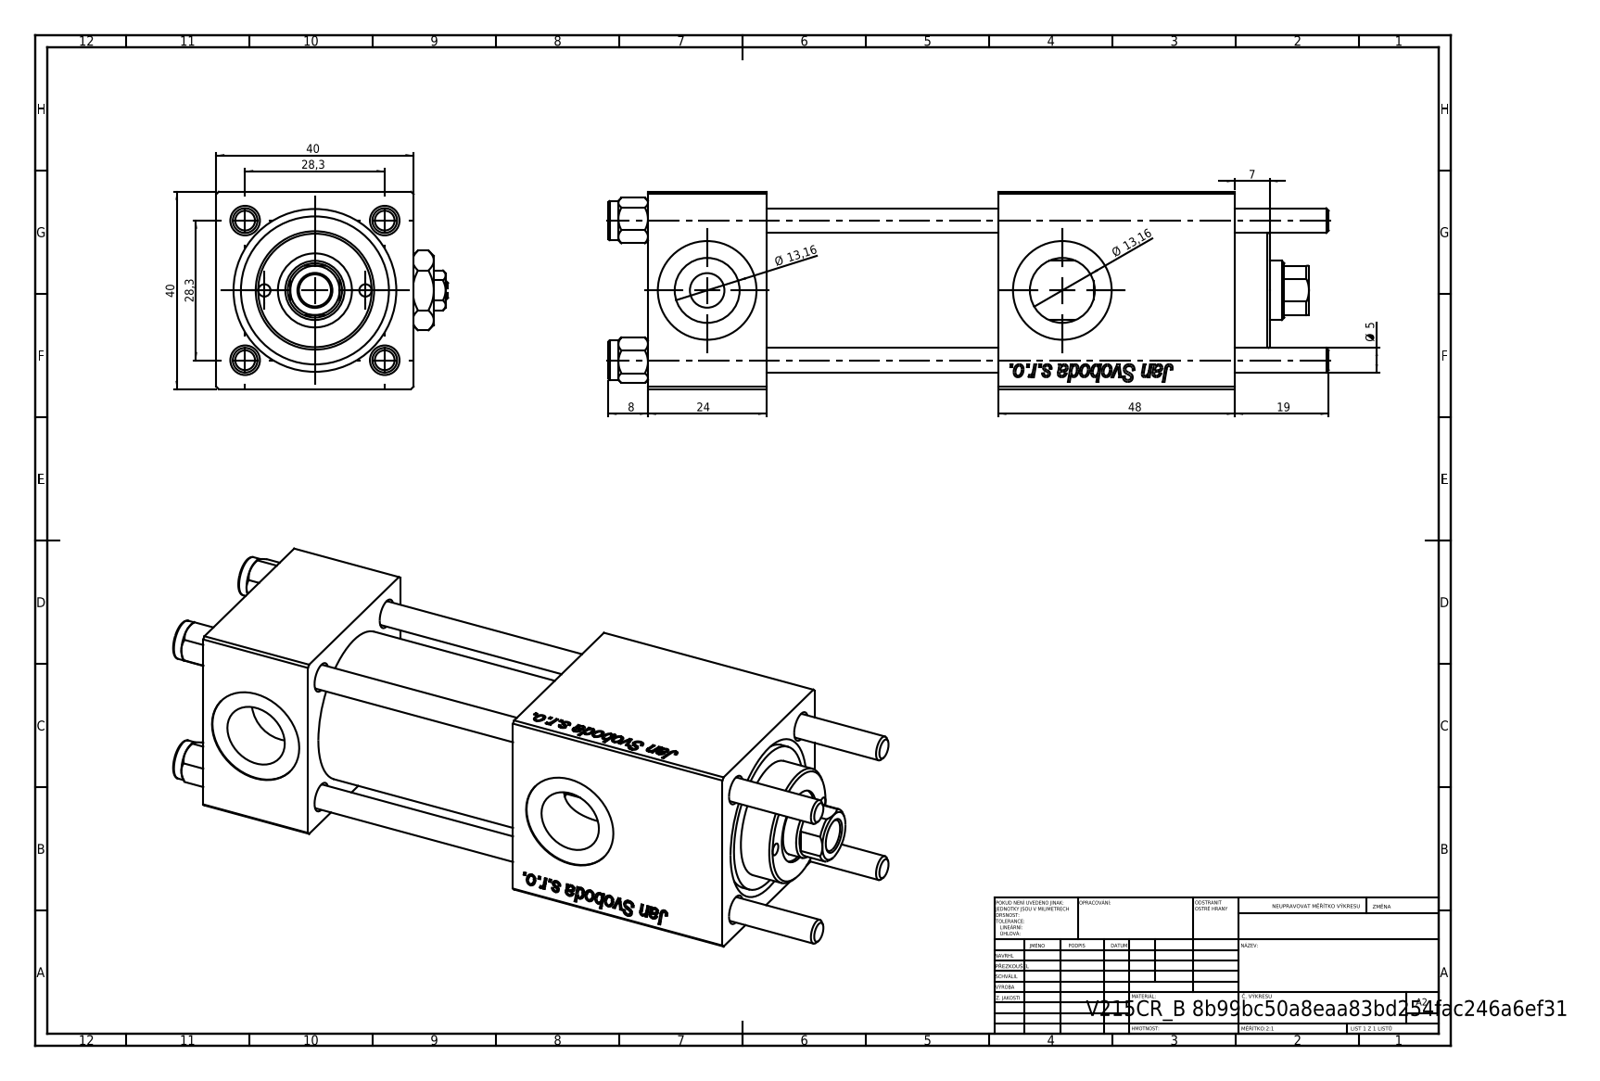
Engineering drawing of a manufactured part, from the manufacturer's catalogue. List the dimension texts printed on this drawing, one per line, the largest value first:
48
40
40
28,3
28,3
24
19
Ø 13,16
Ø 13,16
8
7
Ø 5
